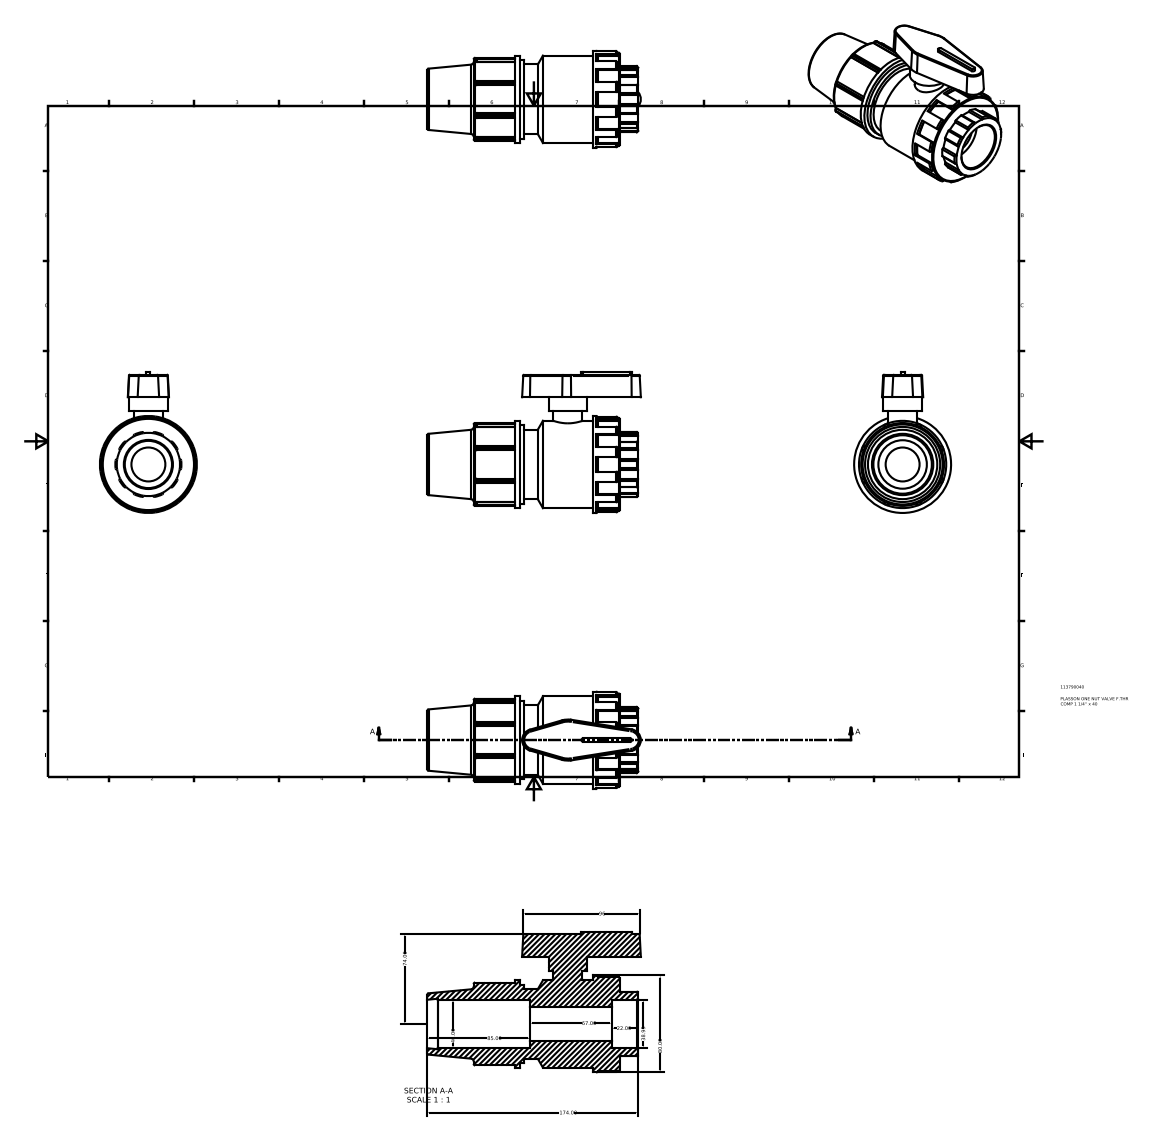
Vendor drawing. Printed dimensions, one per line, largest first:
174.00
96
85.00
80.00
74.00
67.00
40.00
38.95
22.00
